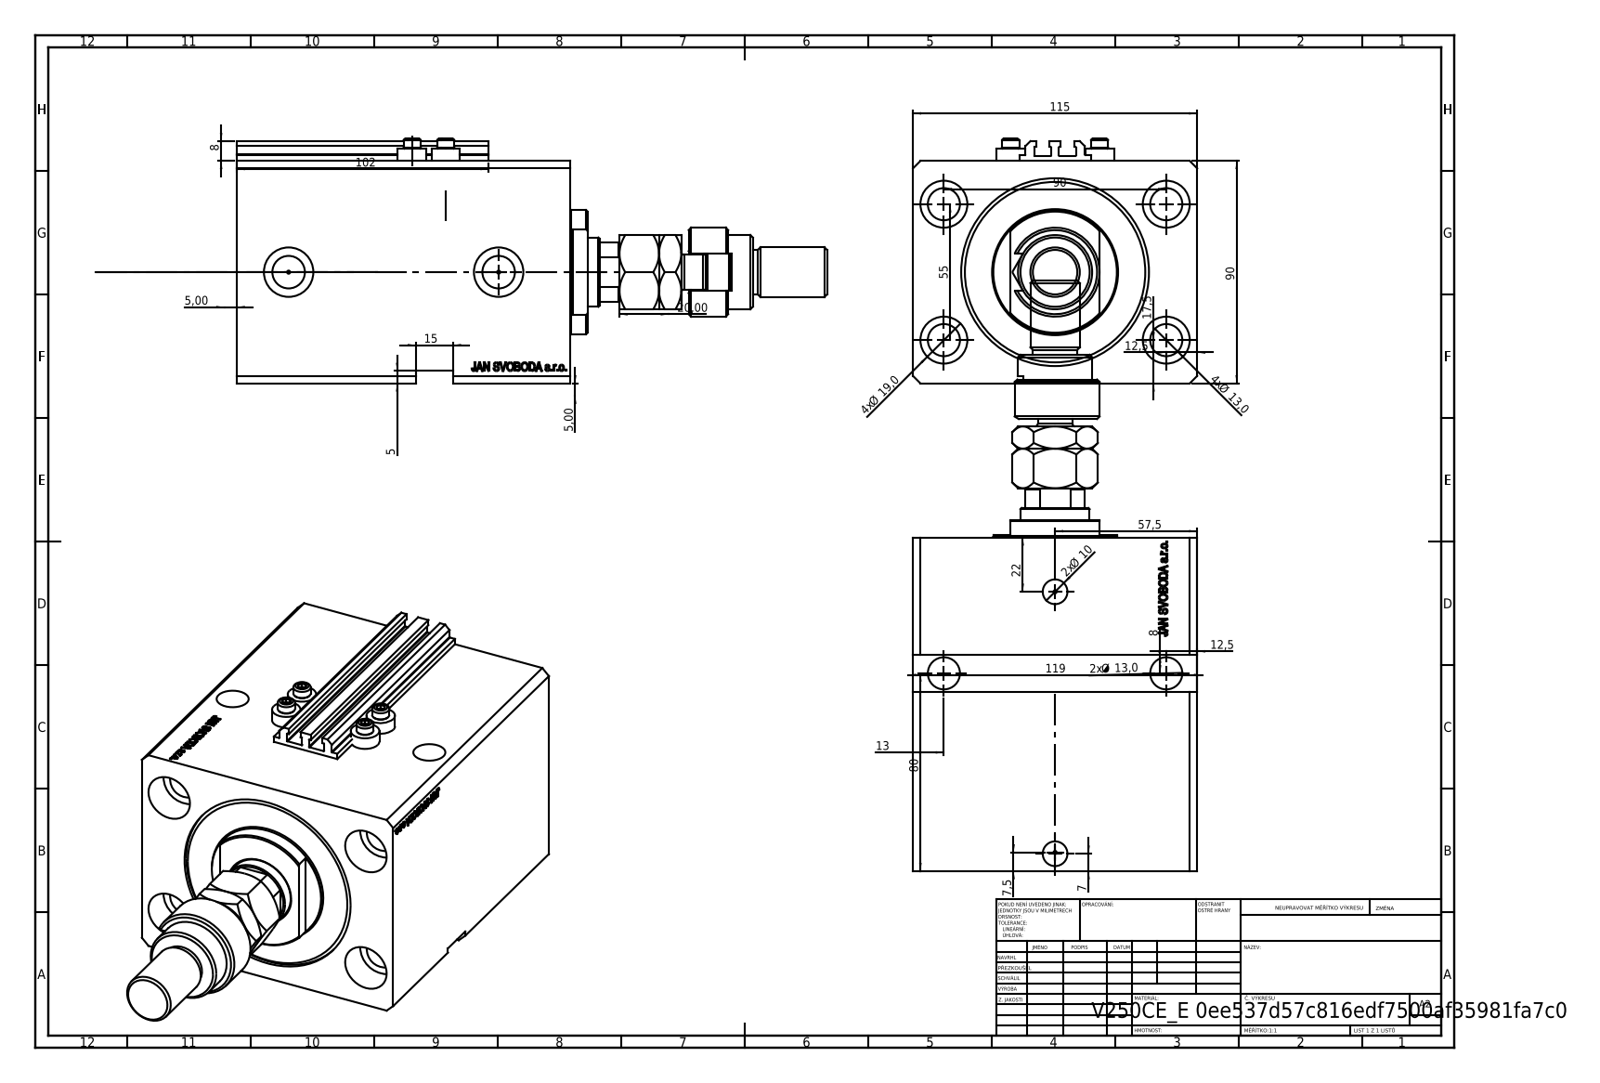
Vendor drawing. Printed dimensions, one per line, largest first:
119
115
102
90
90
80
57,5
55
22
20,00
4x Ø 19,0
17,5
15
4x Ø 13,0
2x Ø 13,0
13
12,5
12,5
2x Ø 10
8
8
7,5
7
5,00
5,00
5
